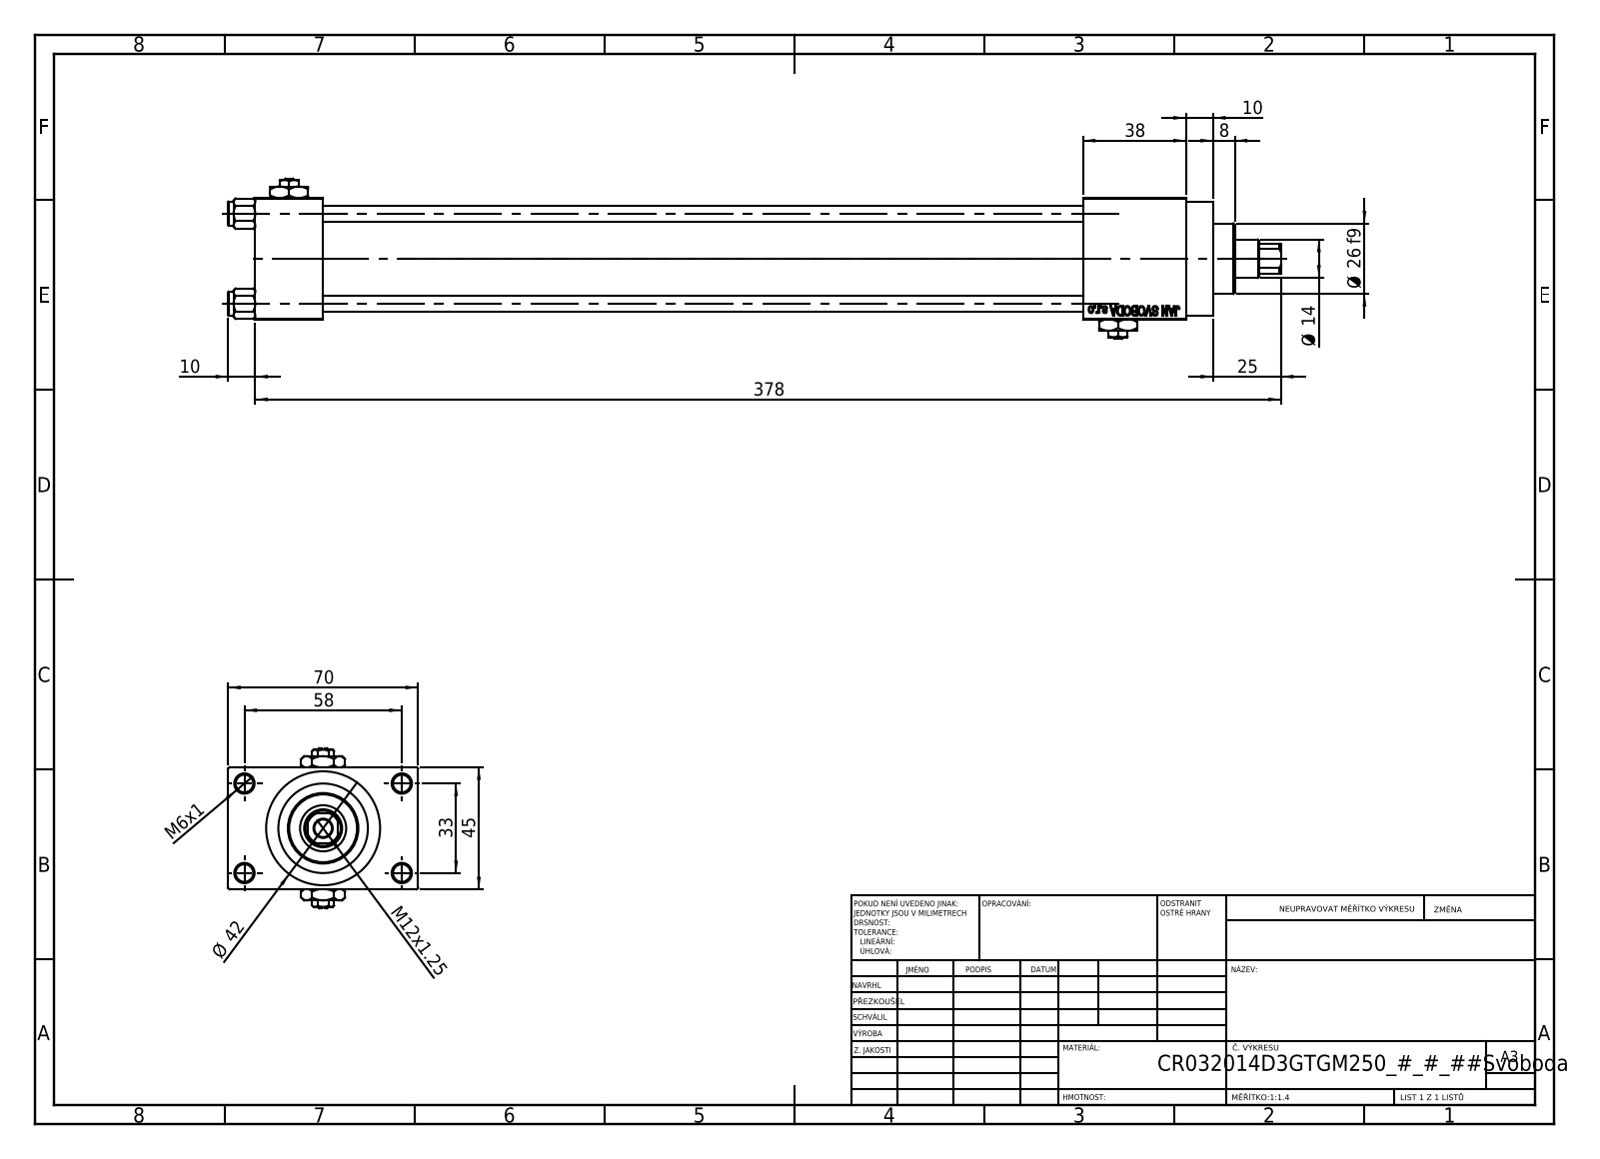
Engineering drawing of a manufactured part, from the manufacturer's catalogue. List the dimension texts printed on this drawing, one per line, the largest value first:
378
70
58
45
Ø 42
38
33
Ø 26 f9
25
Ø 14
M12x1.25
10
10
8
M6x1
